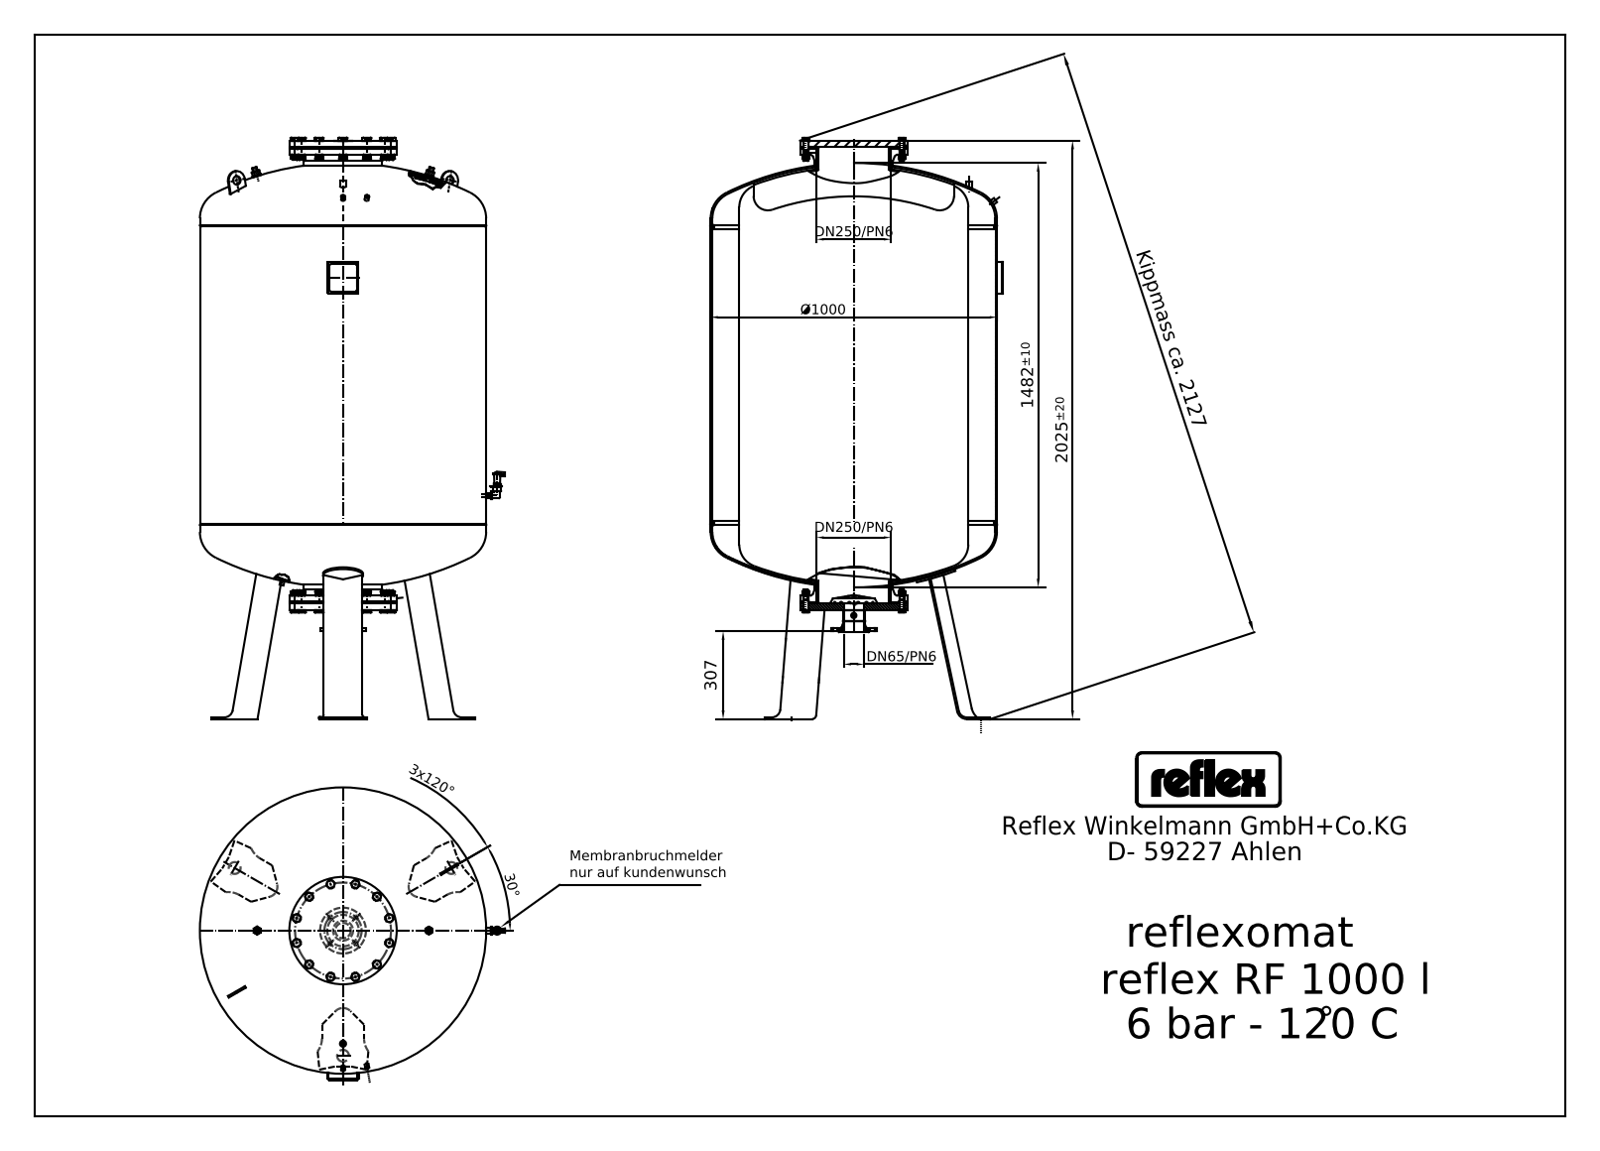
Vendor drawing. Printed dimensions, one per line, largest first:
Kippmass ca. 2127
2025±20
1482±10
Ø1000
307
DN250/PN6
DN250/PN6
3x120°
DN65/PN6
30°
